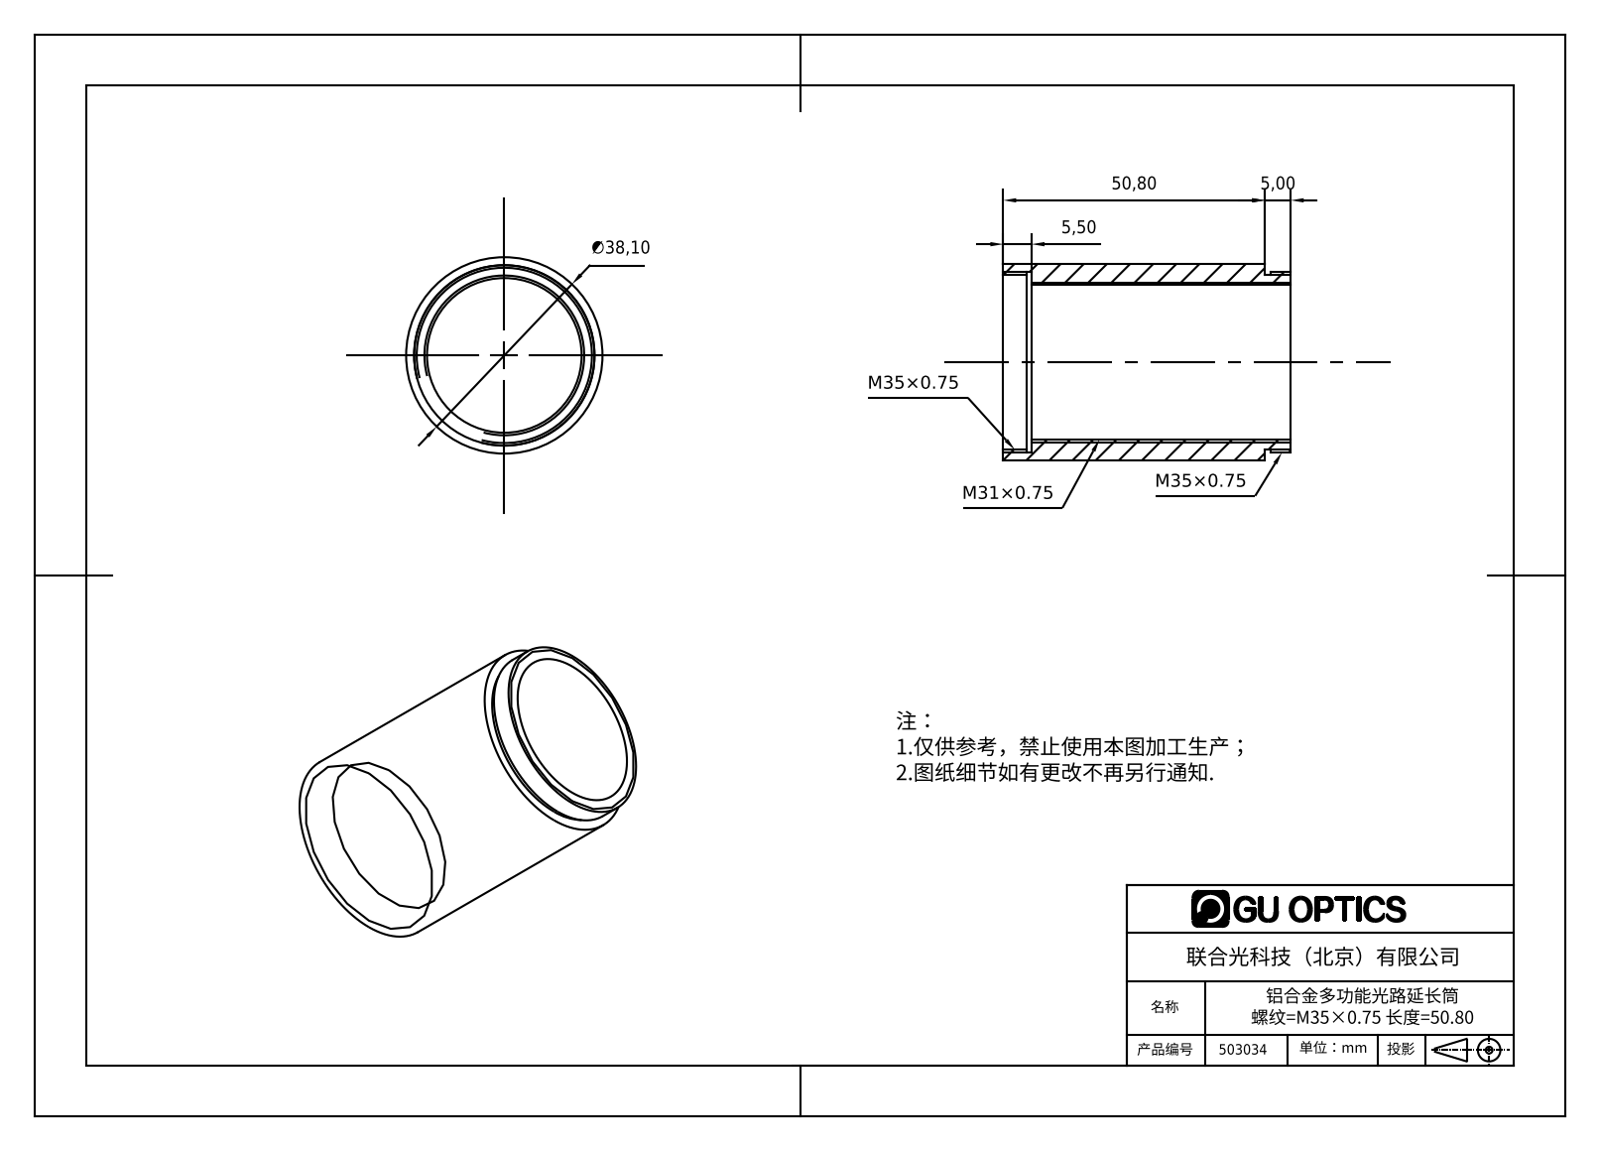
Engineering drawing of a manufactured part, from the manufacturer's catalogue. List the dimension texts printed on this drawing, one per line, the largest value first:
50,80
∅38,10
5,50
5,00
